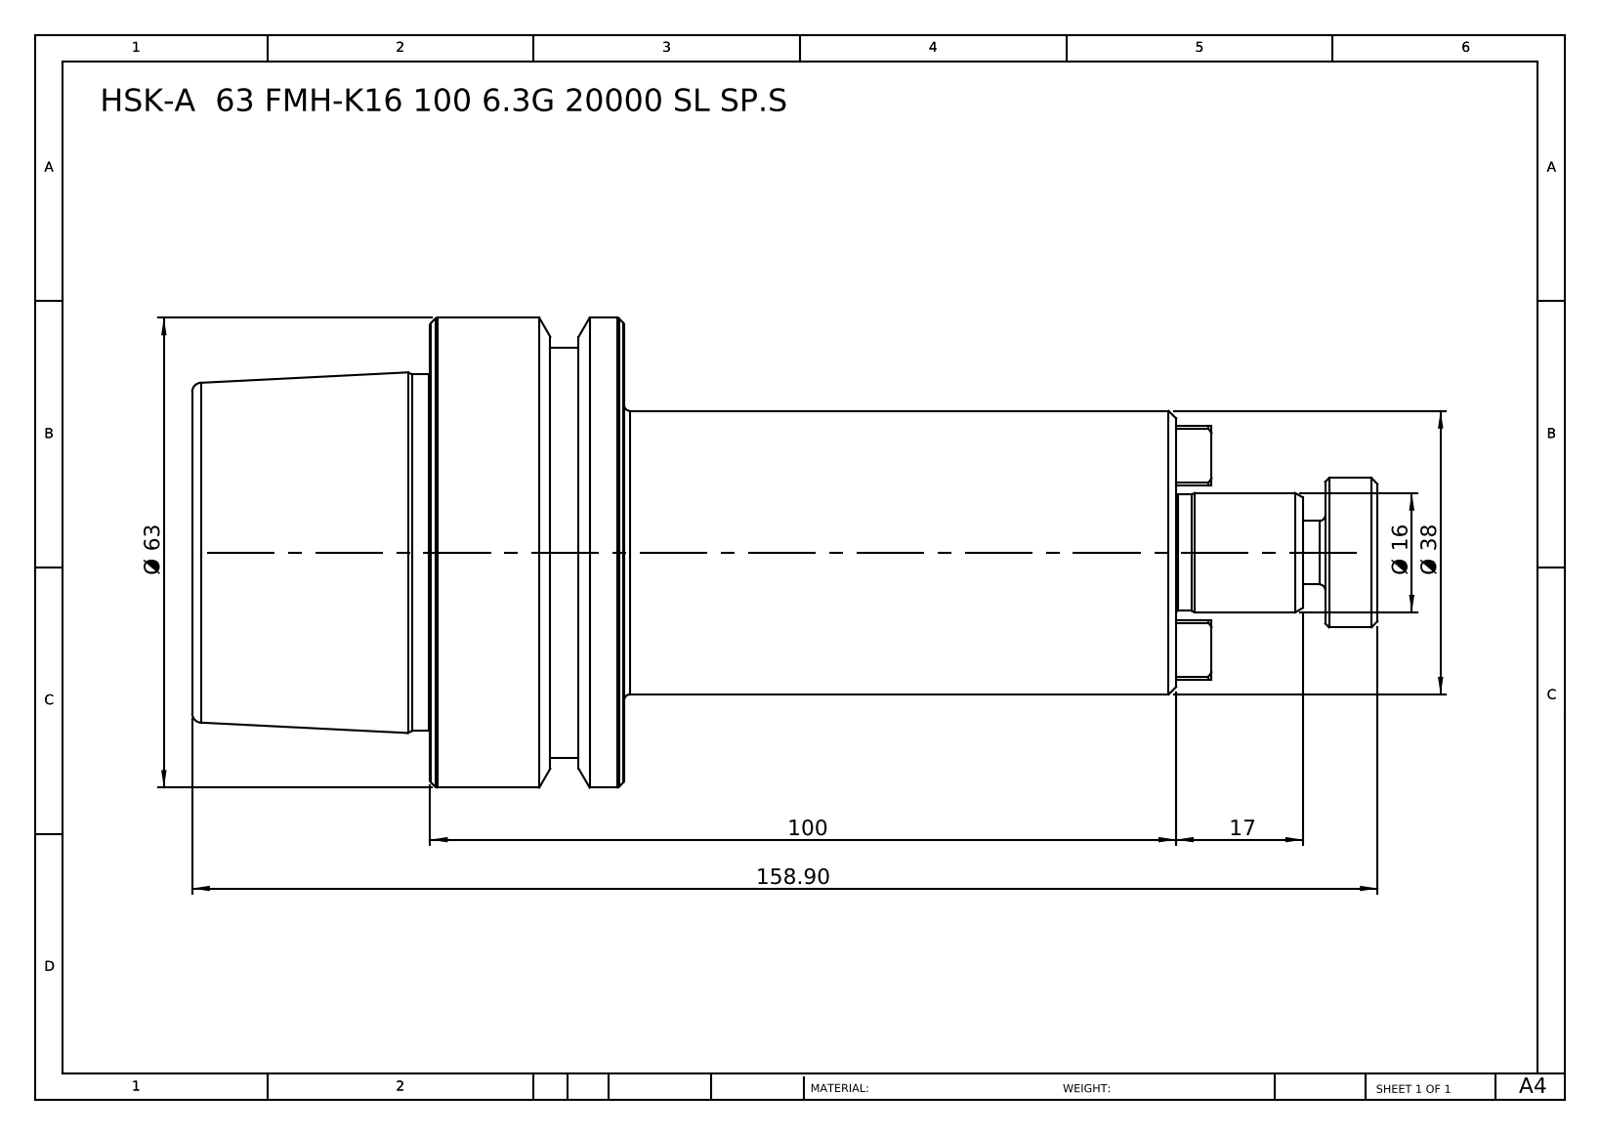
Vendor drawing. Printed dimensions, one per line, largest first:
158.90
100
Ø 63
Ø 38
17
Ø 16
